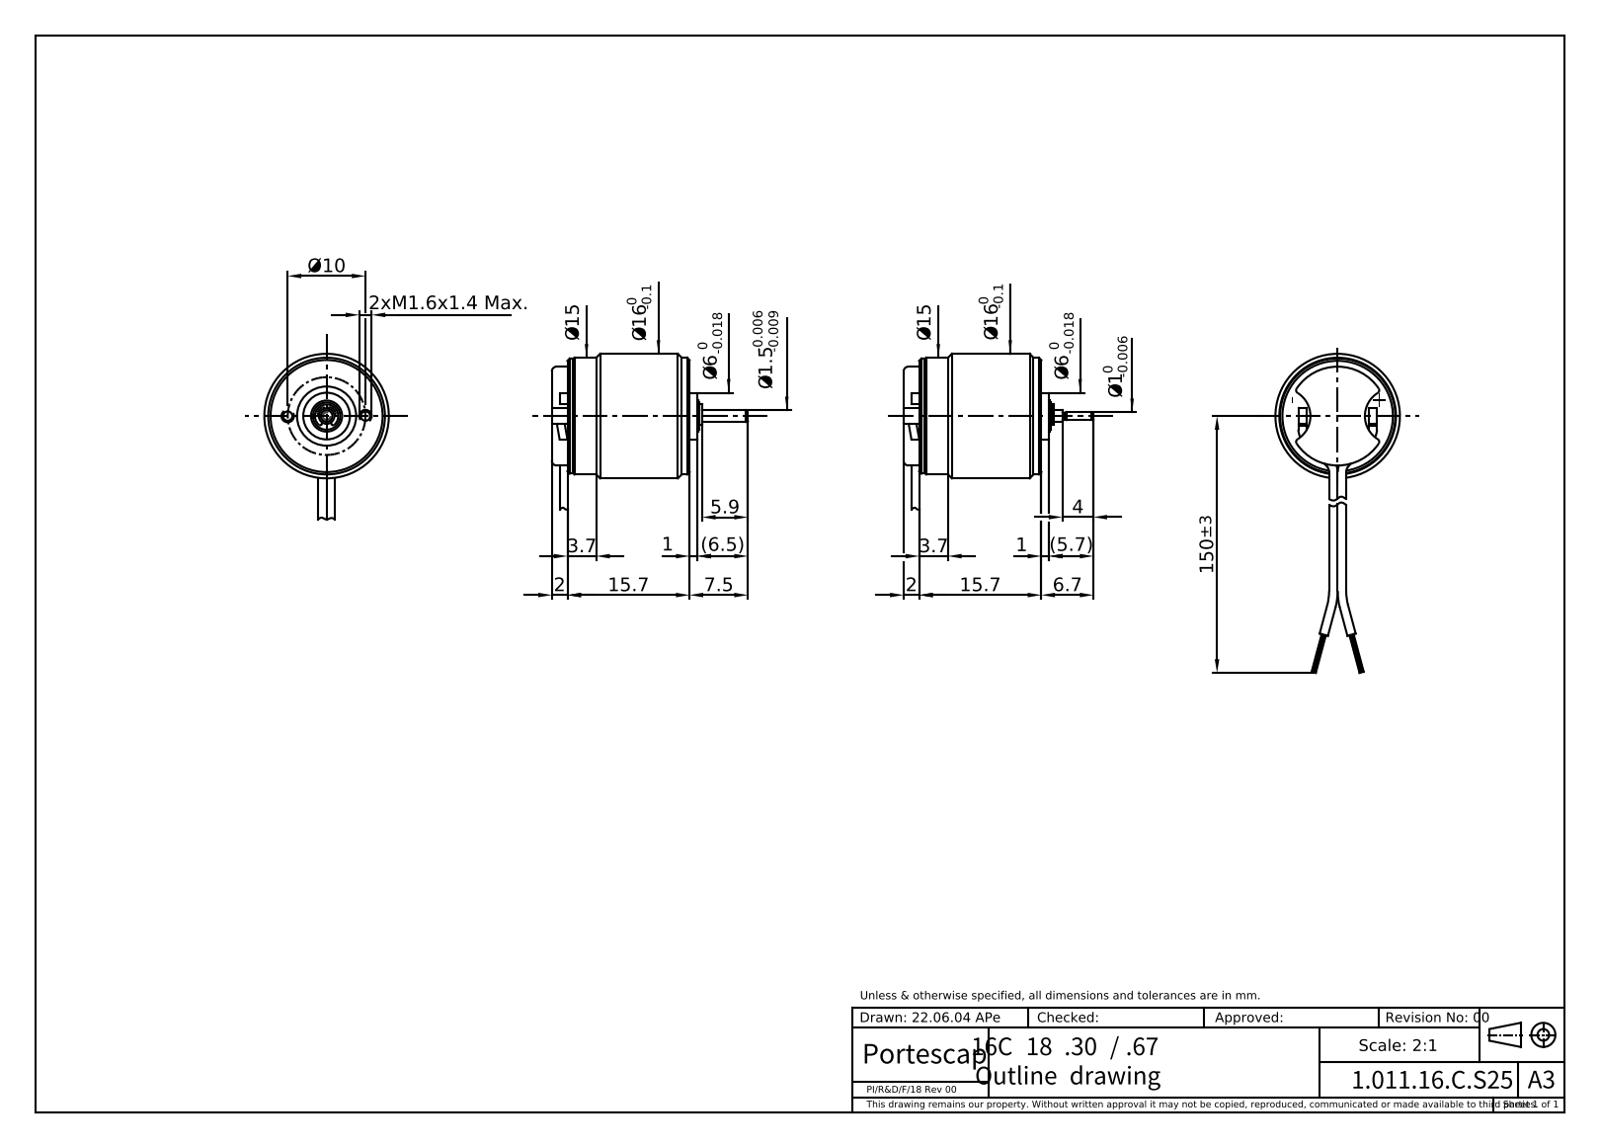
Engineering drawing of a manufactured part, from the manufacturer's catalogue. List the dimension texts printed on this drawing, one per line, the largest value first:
150±3
15.7
15.7
Ø10
7.5
6.7
(6.5)
5.9
(5.7)
4
3.7
3.7
2
2
2xM1.6x1.4 Max.
1
1
